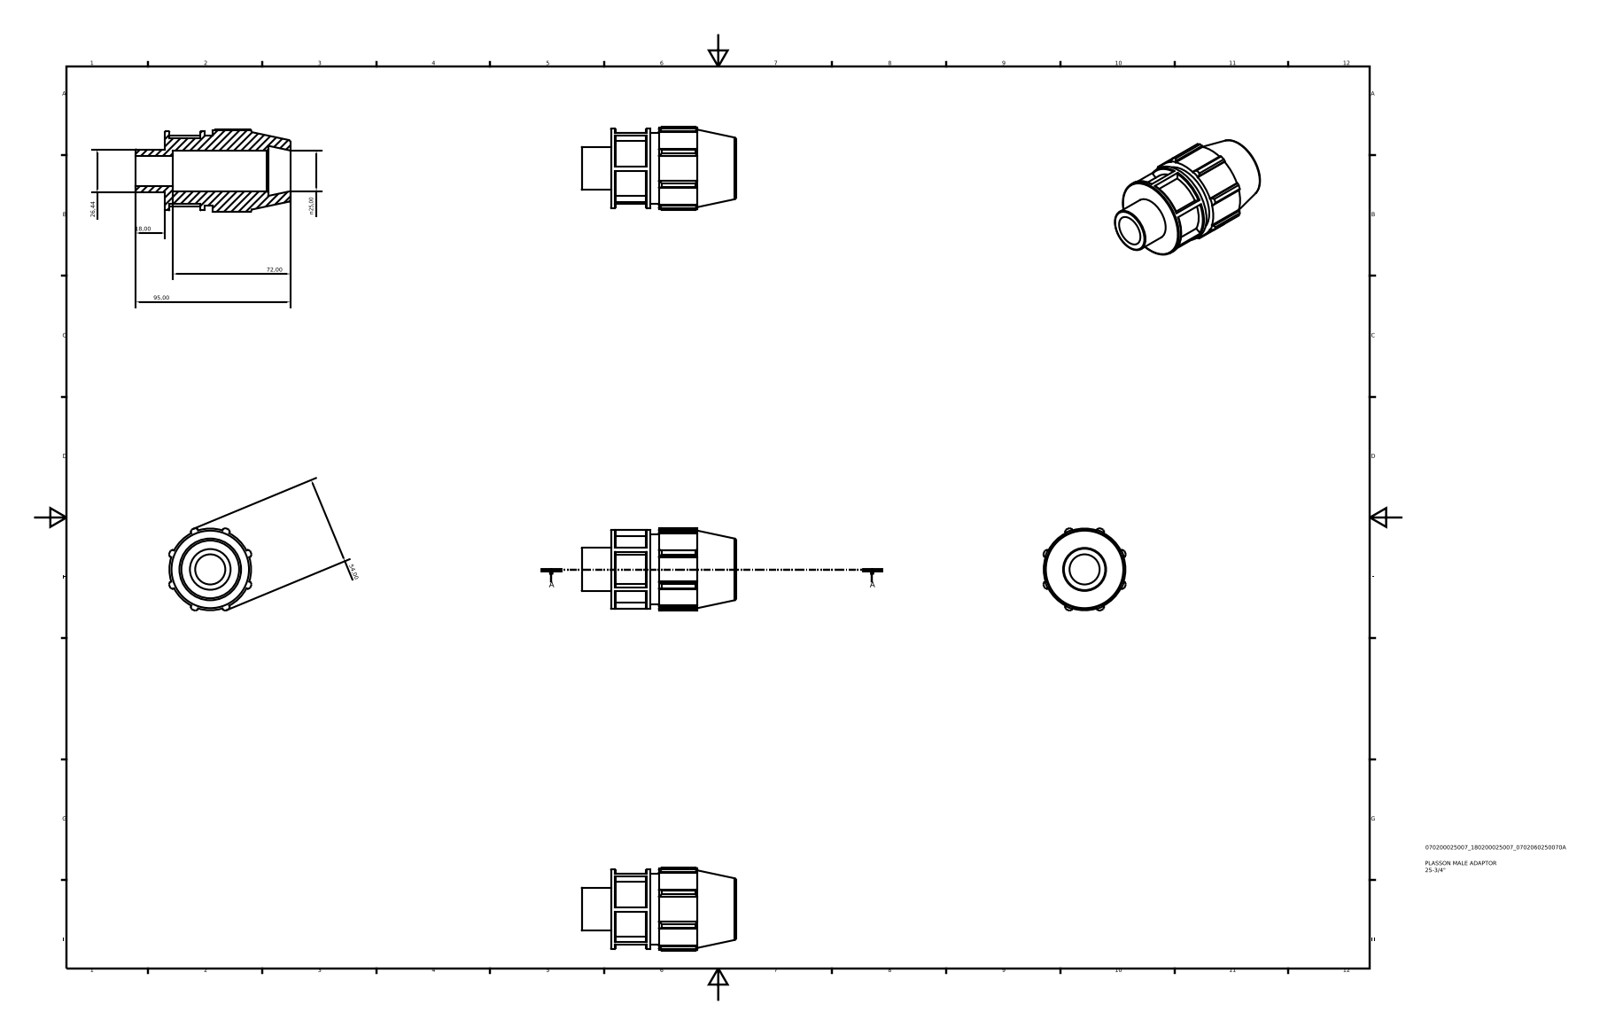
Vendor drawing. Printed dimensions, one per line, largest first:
95,00
72,00
54,00
26,44
n25,00
18,00
